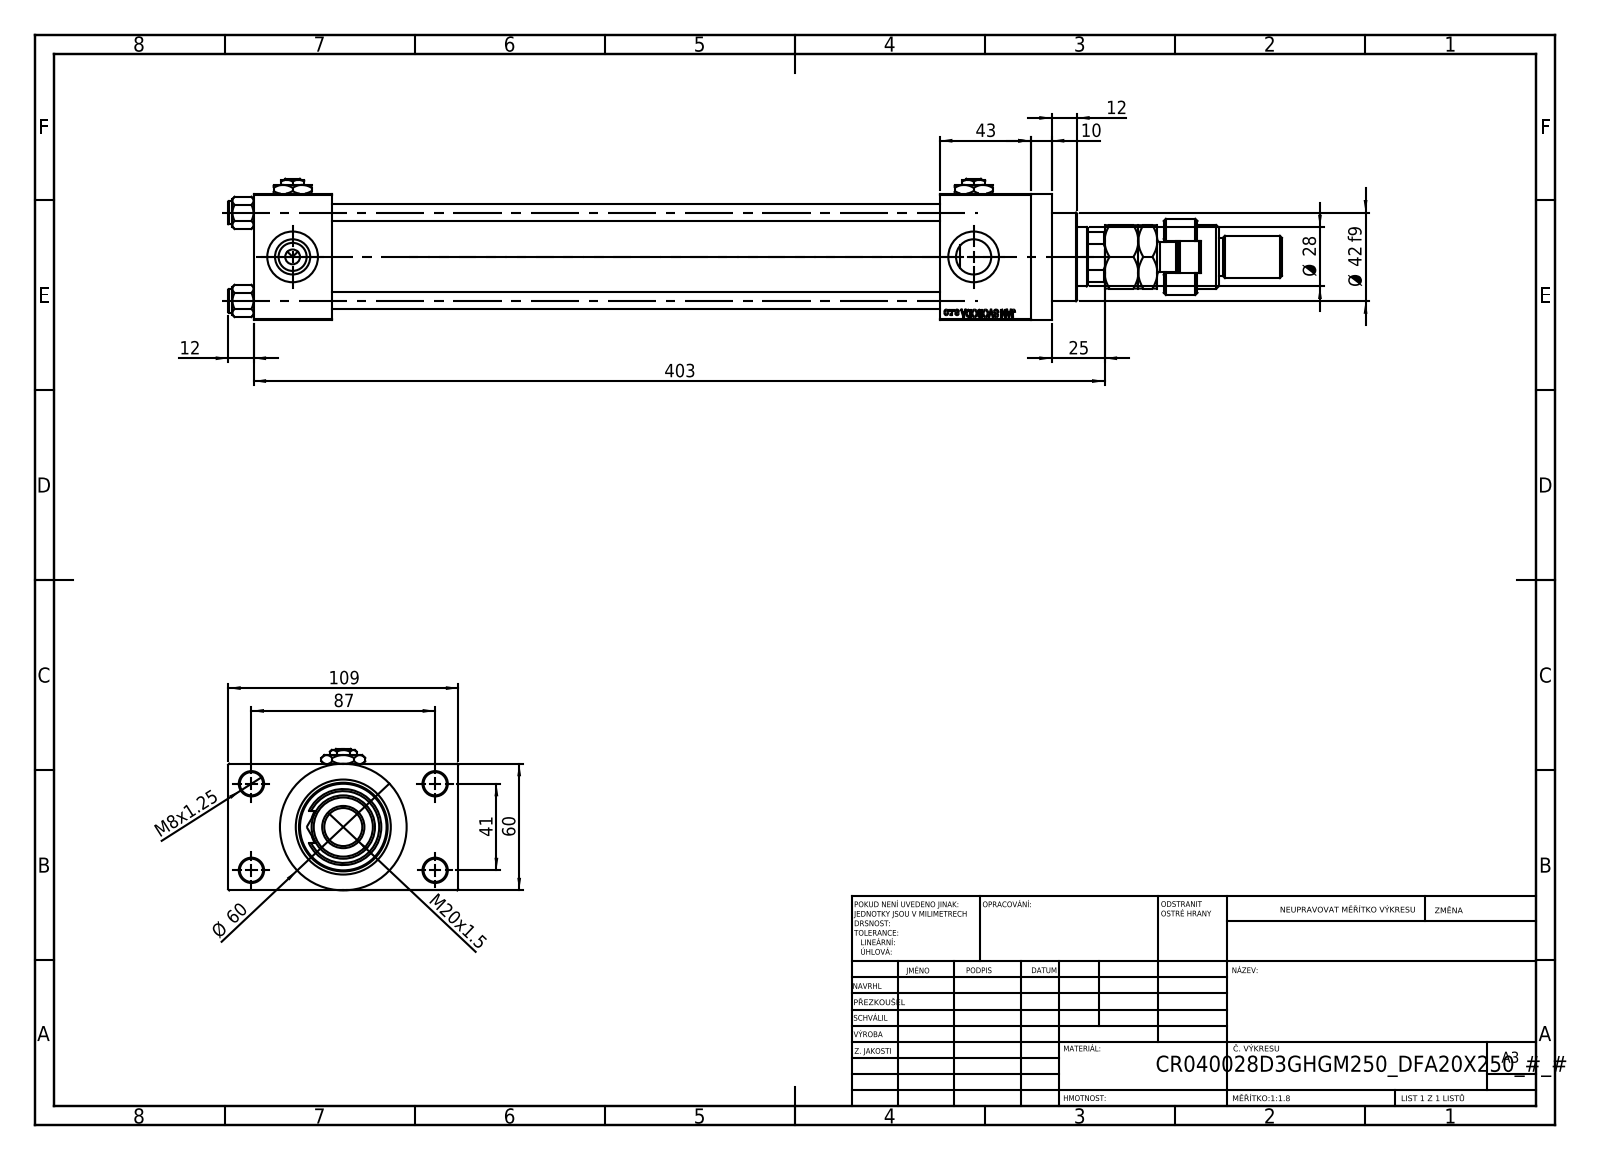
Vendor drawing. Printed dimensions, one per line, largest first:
403
109
87
Ø 60
60
43
Ø 42 f9
41
Ø 28
25
M20x1.5
12
12
10
M8x1.25
